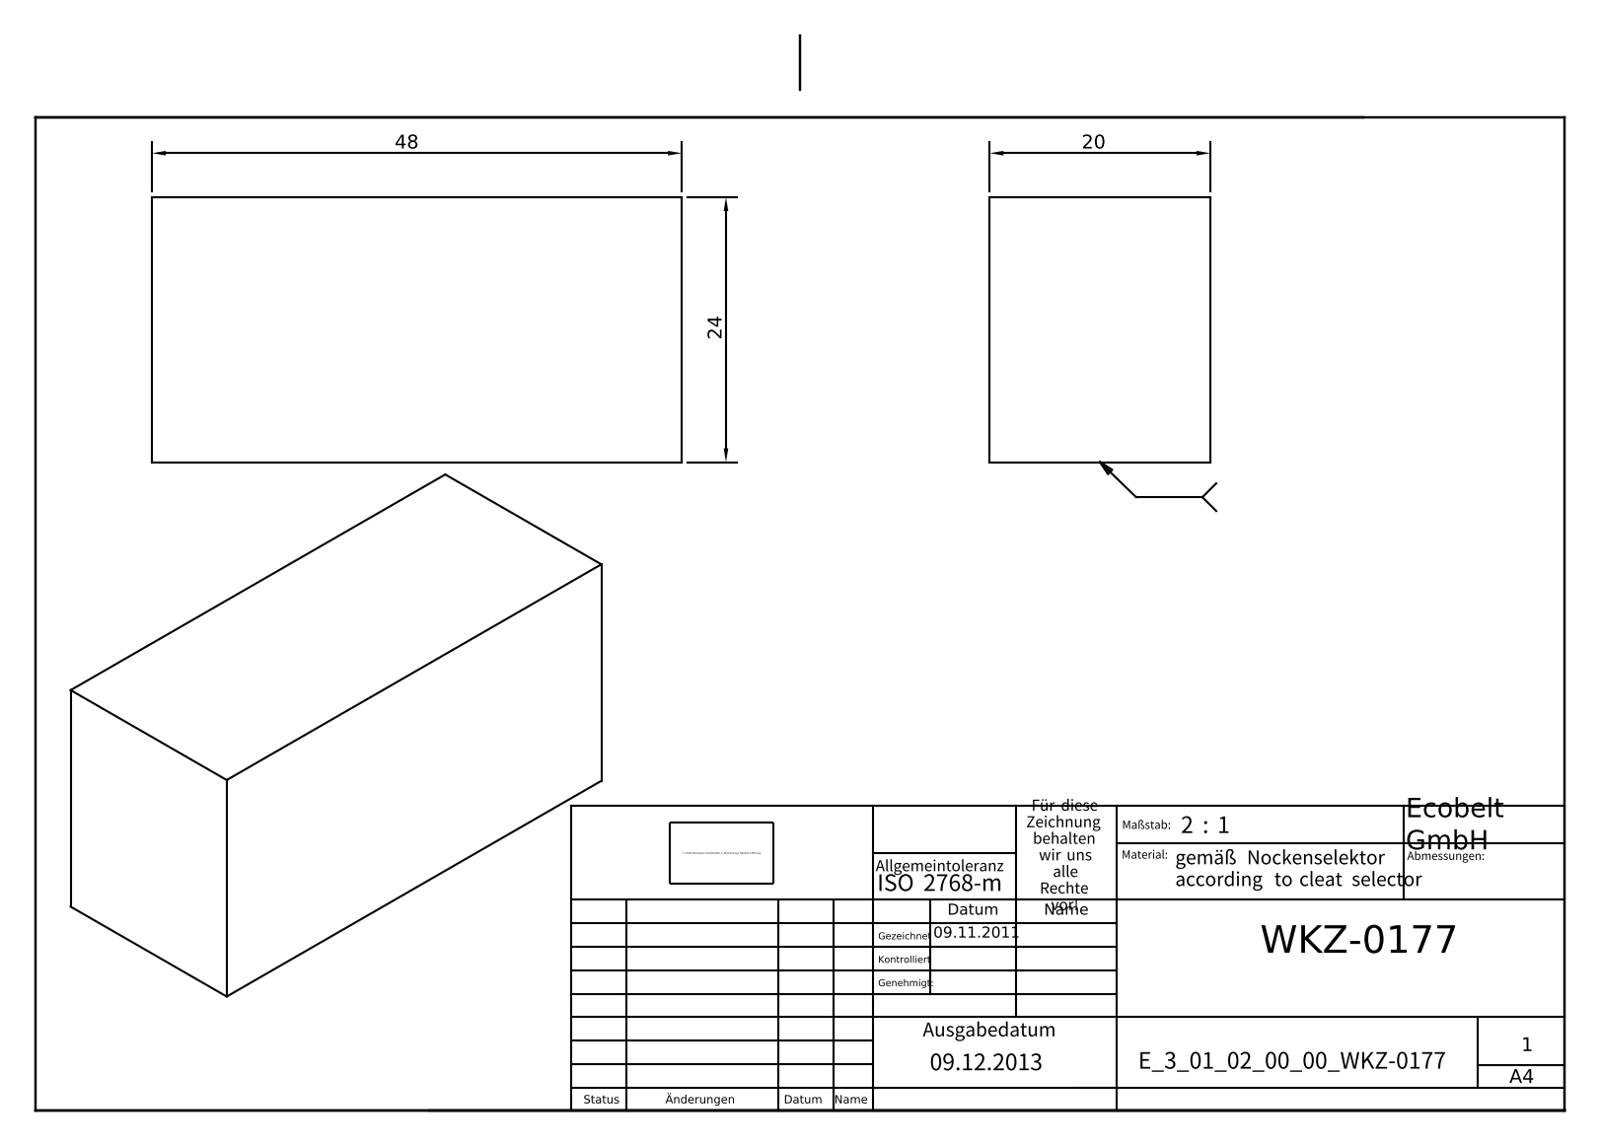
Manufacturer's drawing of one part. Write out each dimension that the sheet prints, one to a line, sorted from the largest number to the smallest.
48
24
20
